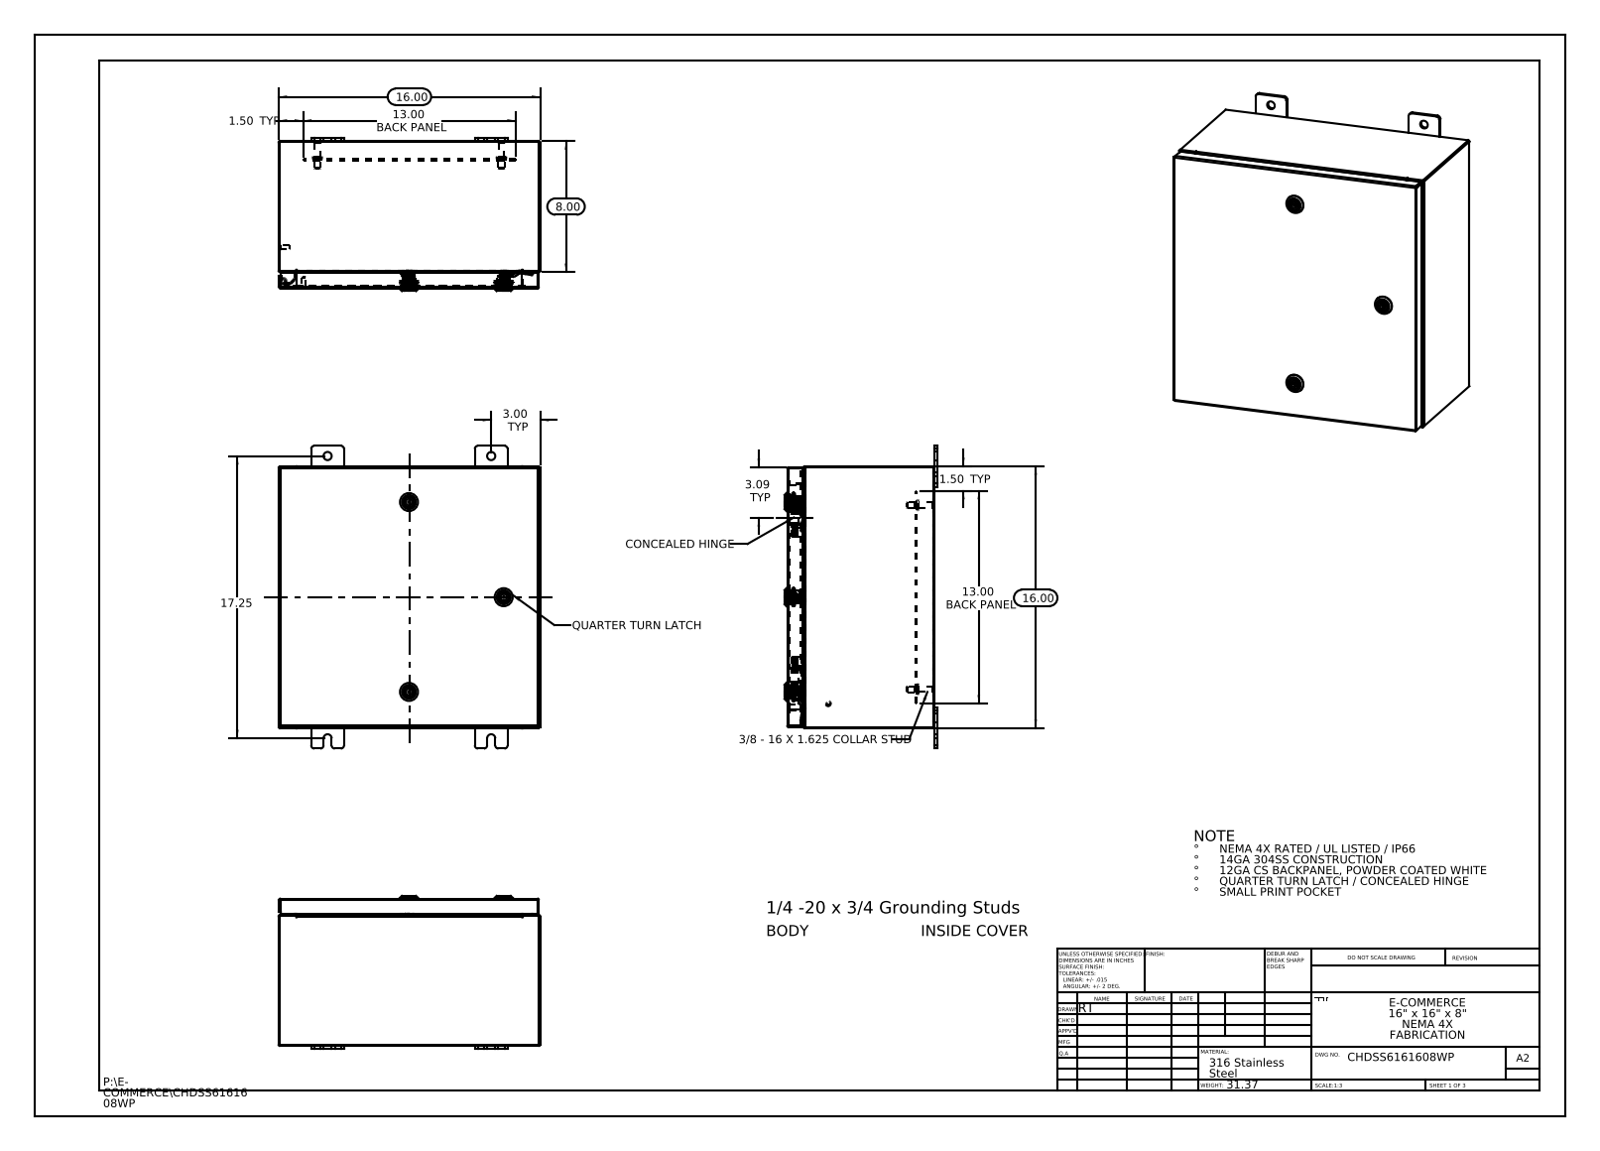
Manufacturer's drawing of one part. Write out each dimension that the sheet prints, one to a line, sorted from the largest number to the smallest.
17.25
16.00
16.00
13.00 BACK PANEL
13.00 BACK PANEL
8.00
3.09 TYP
3.00 TYP
1.50 TYP
1.50 TYP
